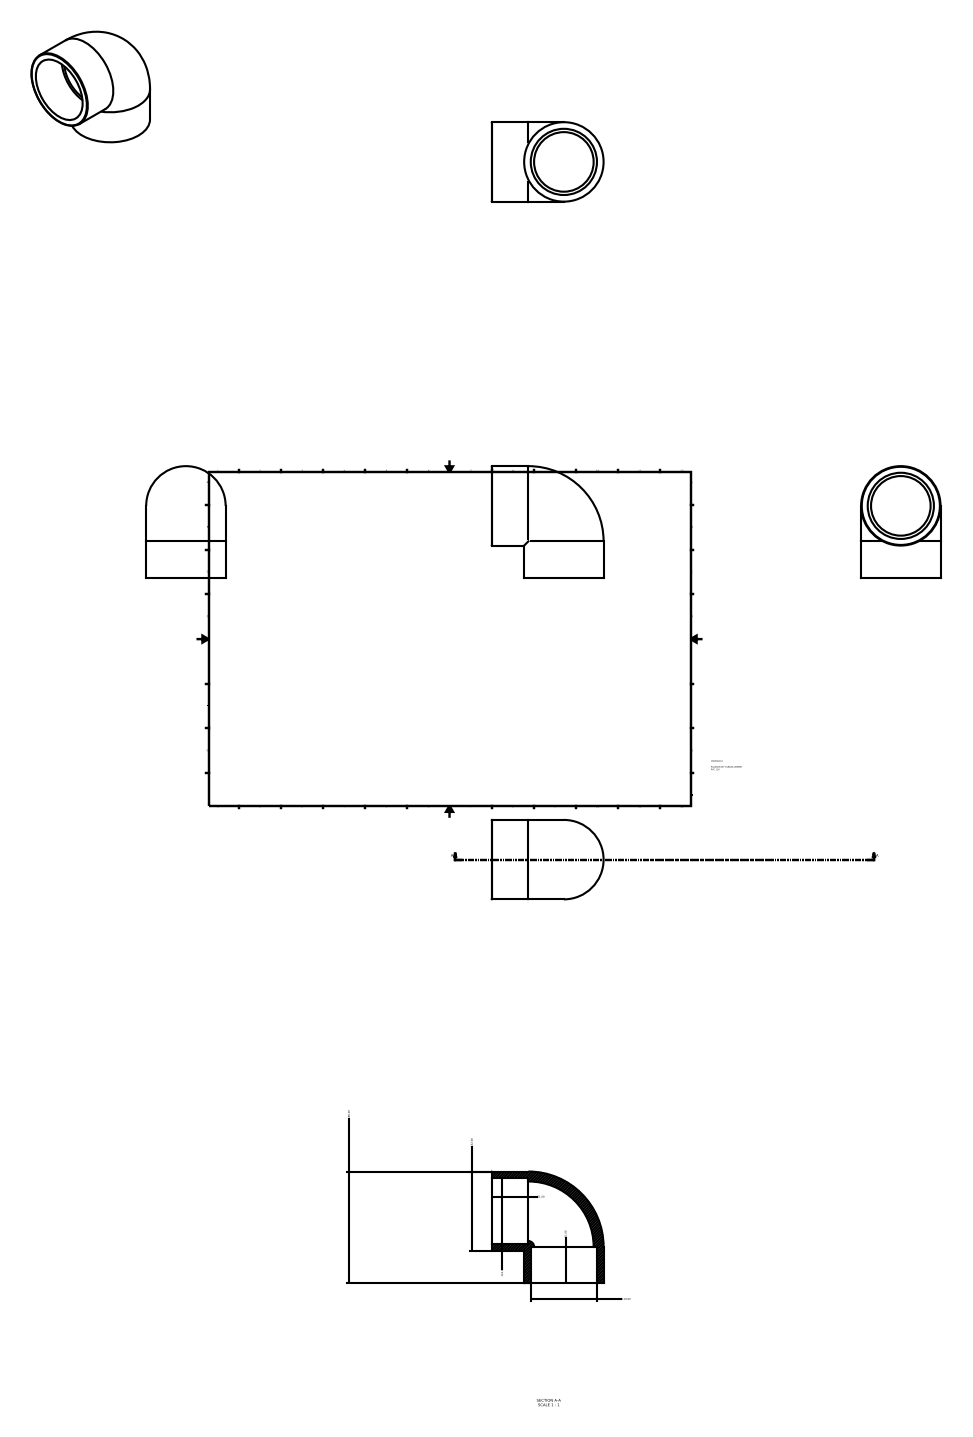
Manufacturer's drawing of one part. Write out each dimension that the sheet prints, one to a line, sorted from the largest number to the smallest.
186.00
132.00
110.00
110.00
61.00
61.00
